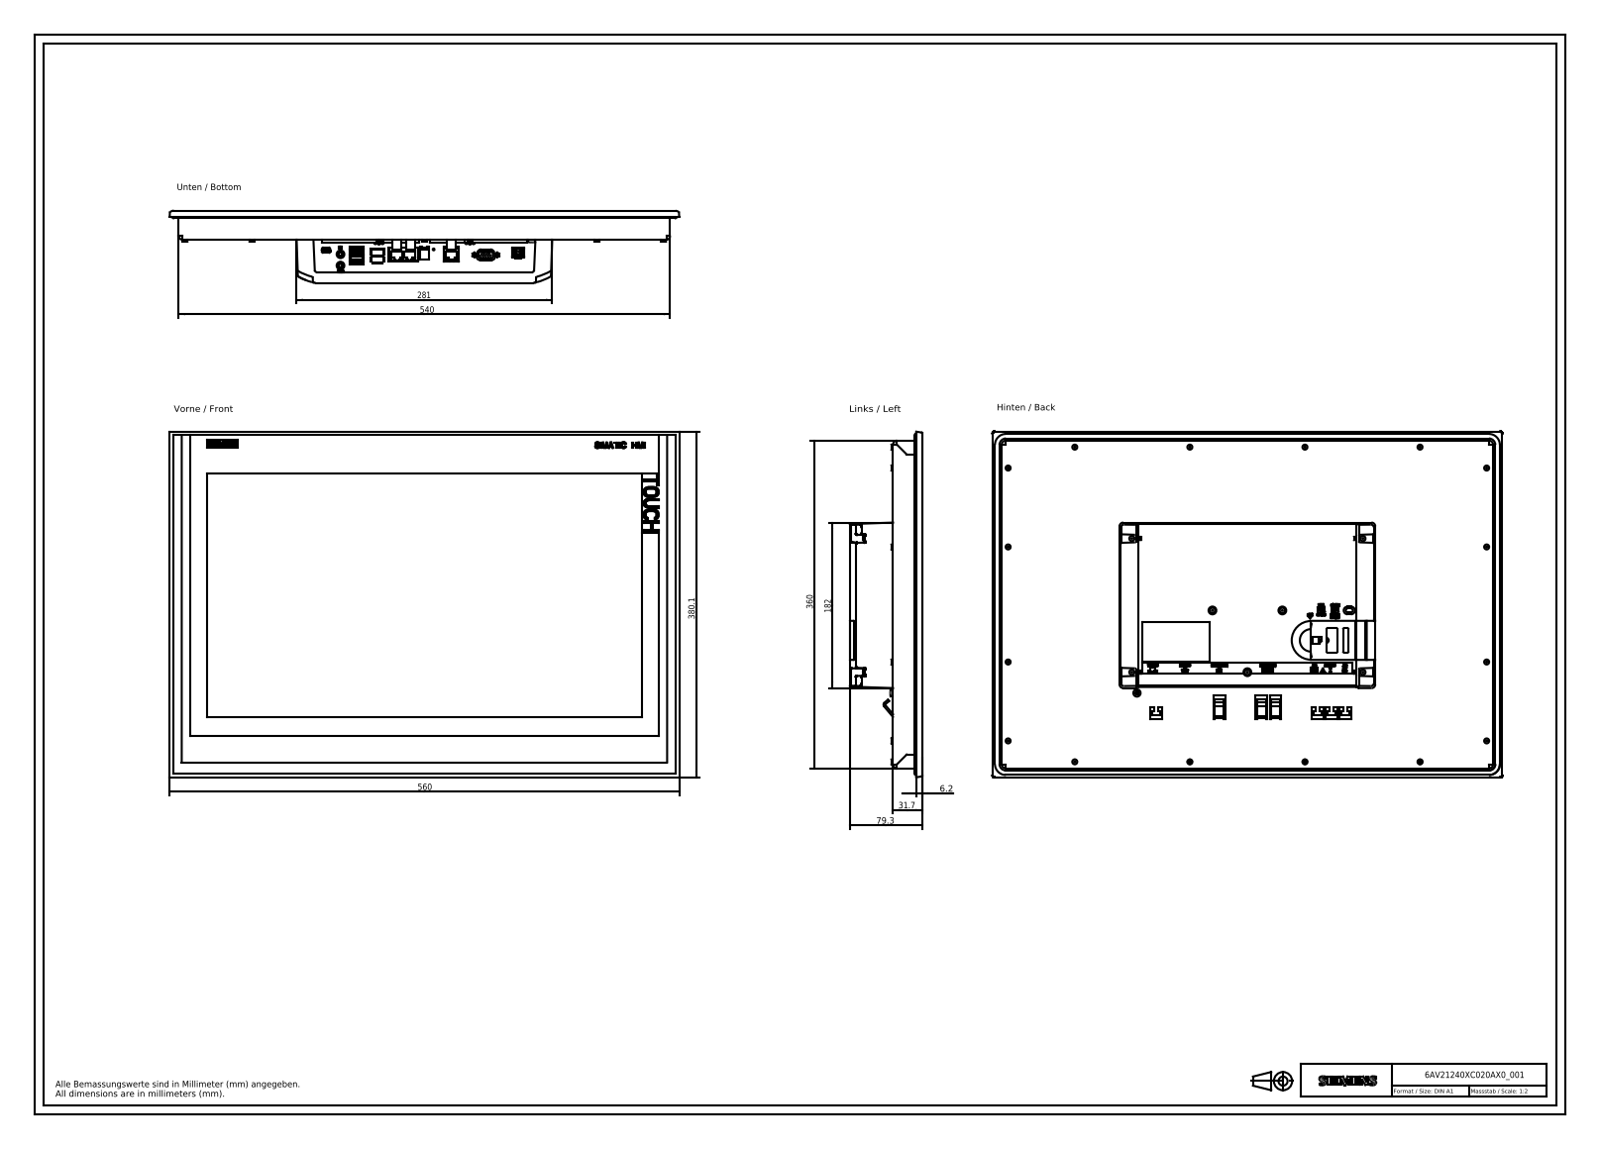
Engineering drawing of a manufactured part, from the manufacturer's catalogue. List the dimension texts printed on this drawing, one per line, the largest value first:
560
540
380.1
360
281
182
79.3
31.7
6.2
